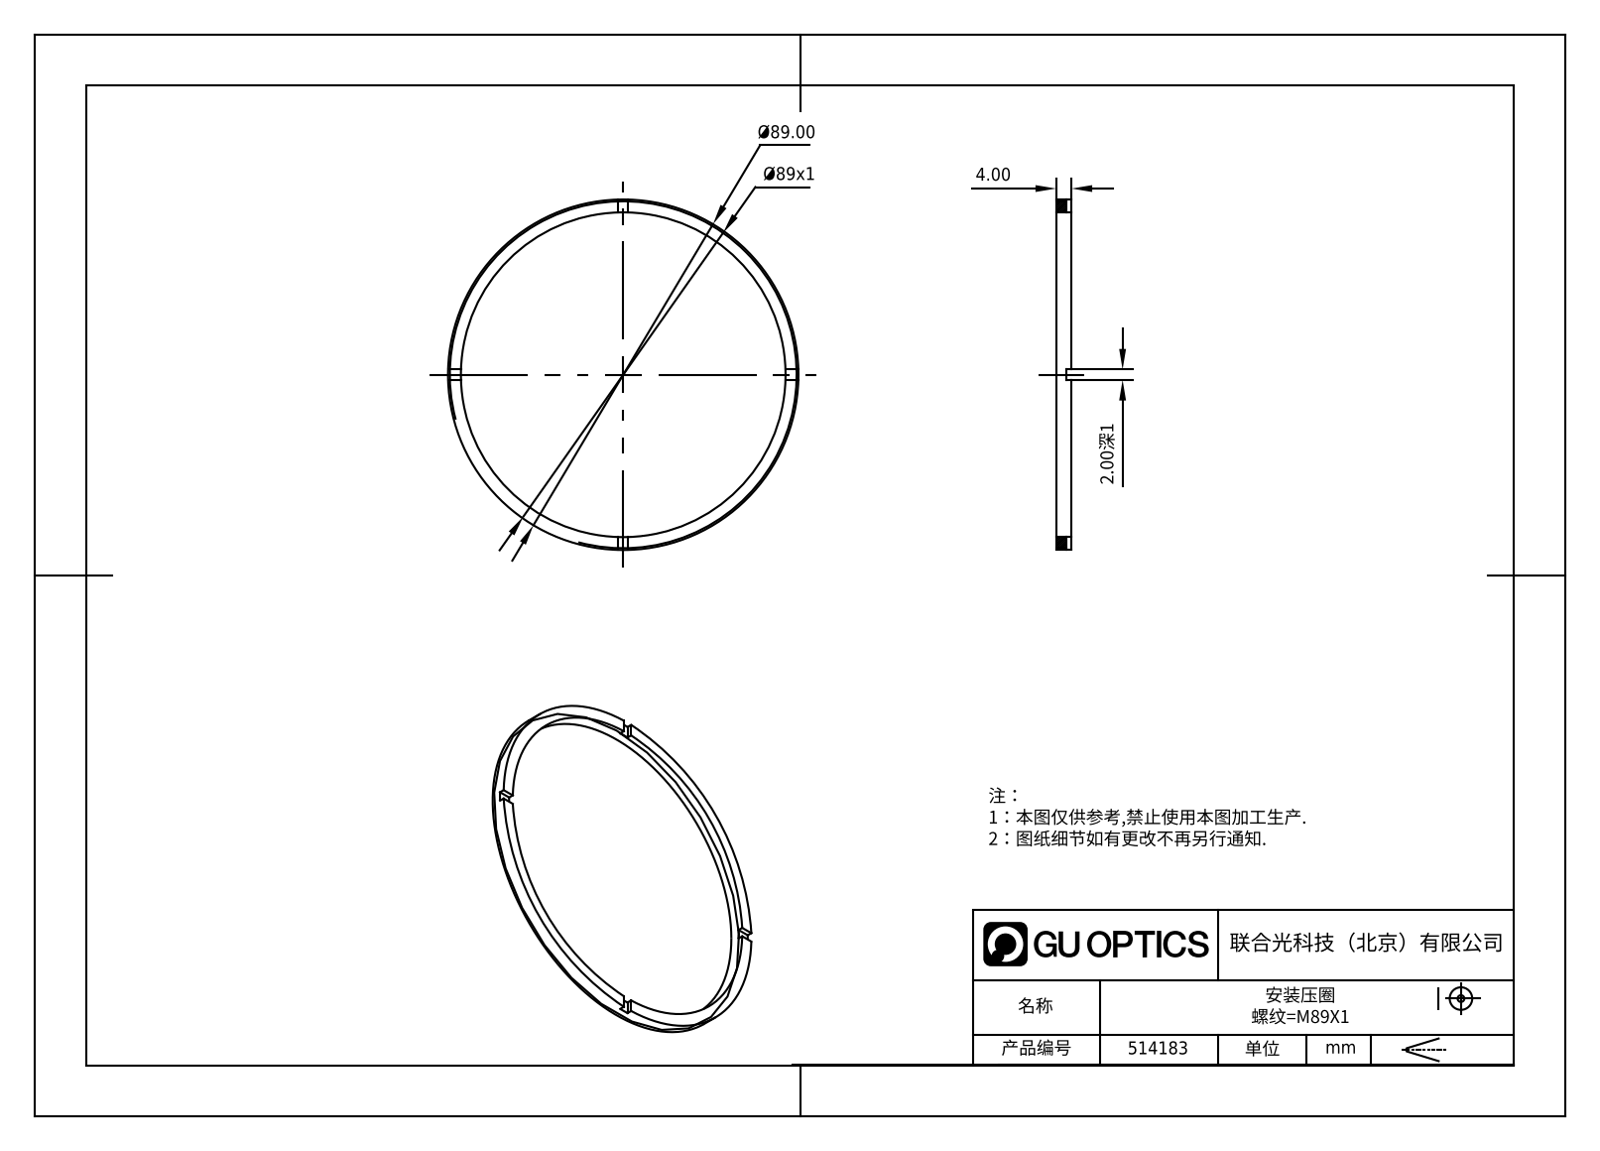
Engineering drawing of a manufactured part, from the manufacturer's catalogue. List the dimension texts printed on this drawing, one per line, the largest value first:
Ø89.00
Ø89x1
4.00
2.00深1
